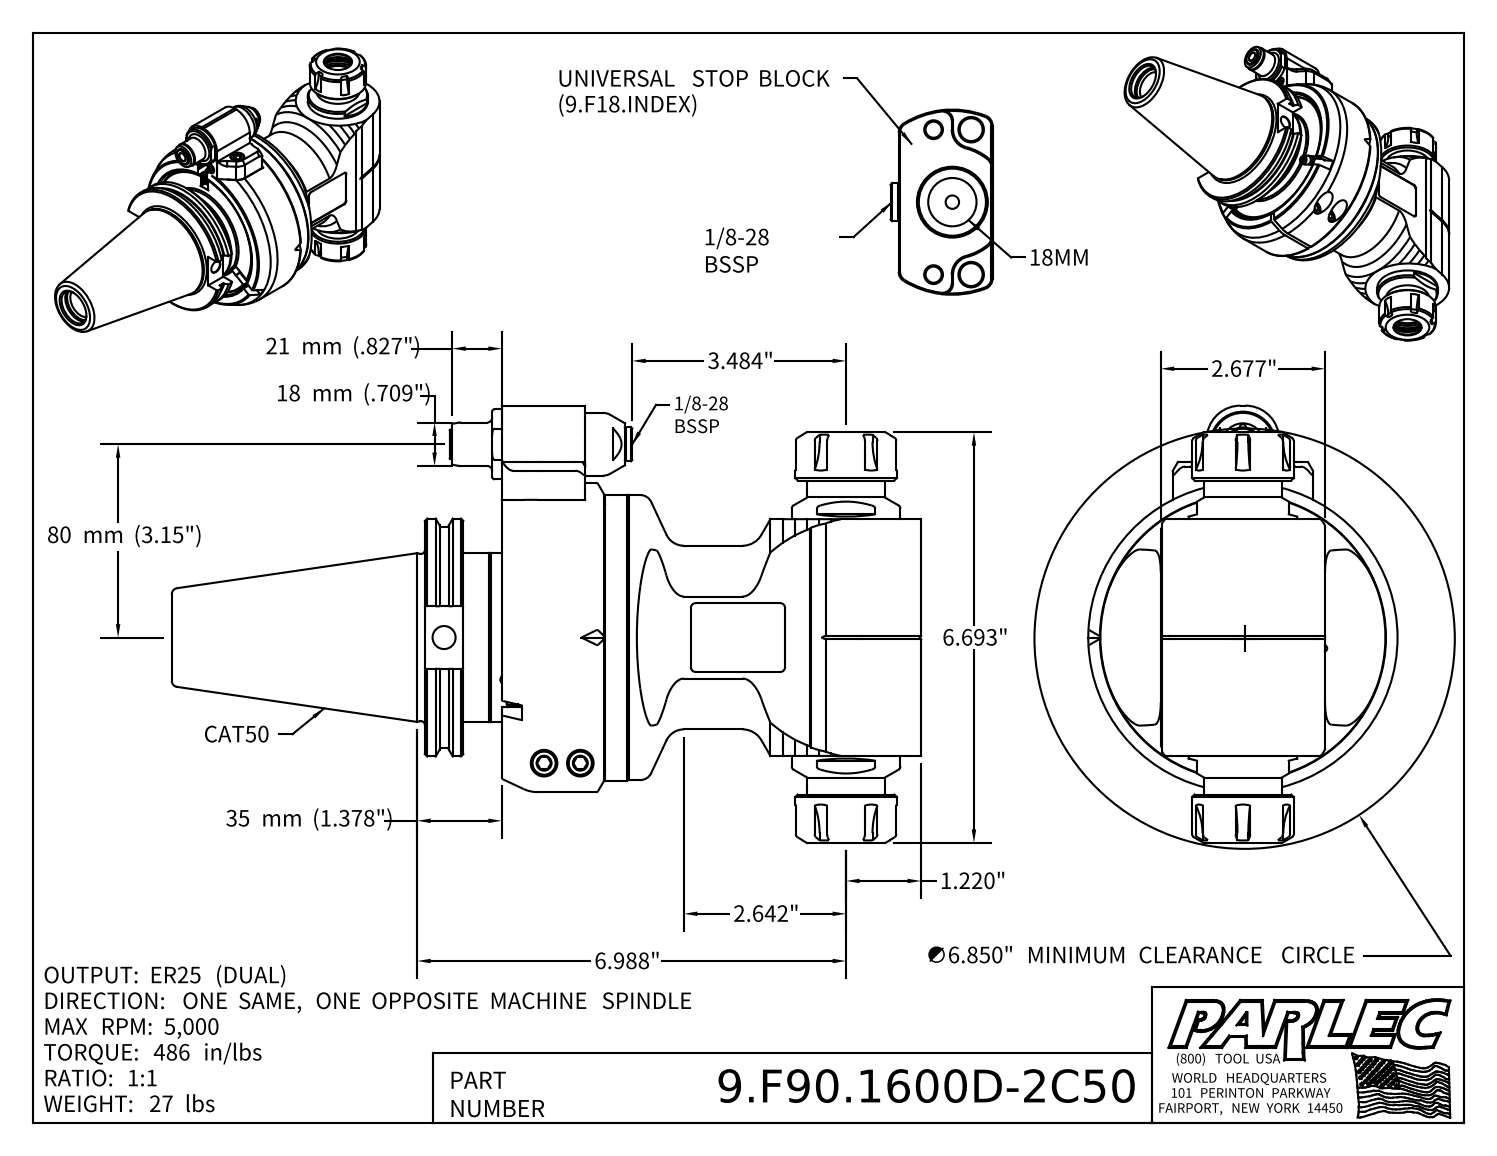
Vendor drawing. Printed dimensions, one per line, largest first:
80 mm (3.15")
35 mm (1.378")
21 mm (.827")
18 mm (.709")
6.988"
∅6.850" MINIMUM CLEARANCE CIRCLE
6.693"
3.484"
2.677"
2.642"
1.220"
